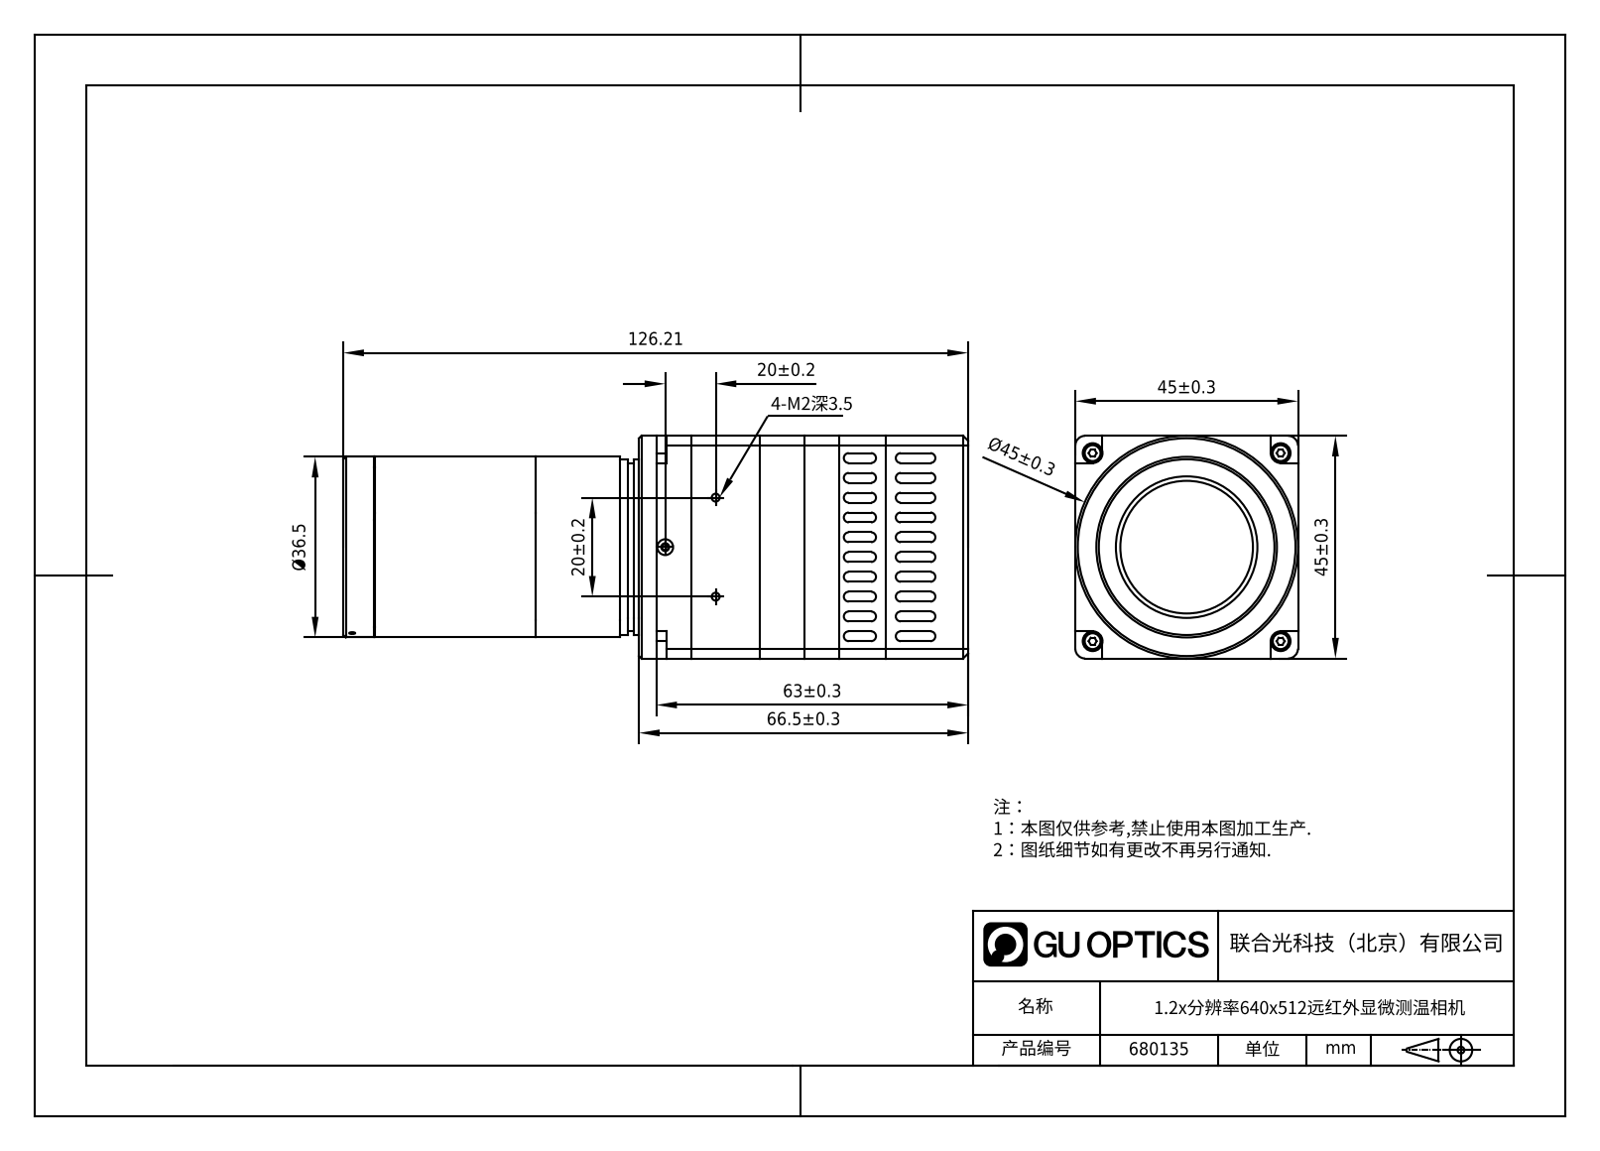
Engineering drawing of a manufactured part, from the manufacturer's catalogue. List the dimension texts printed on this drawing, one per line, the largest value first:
126.21
66.5±0.3
63±0.3
45±0.3
45±0.3
Ø45±0.3
Ø36.5
20±0.2
20±0.2
